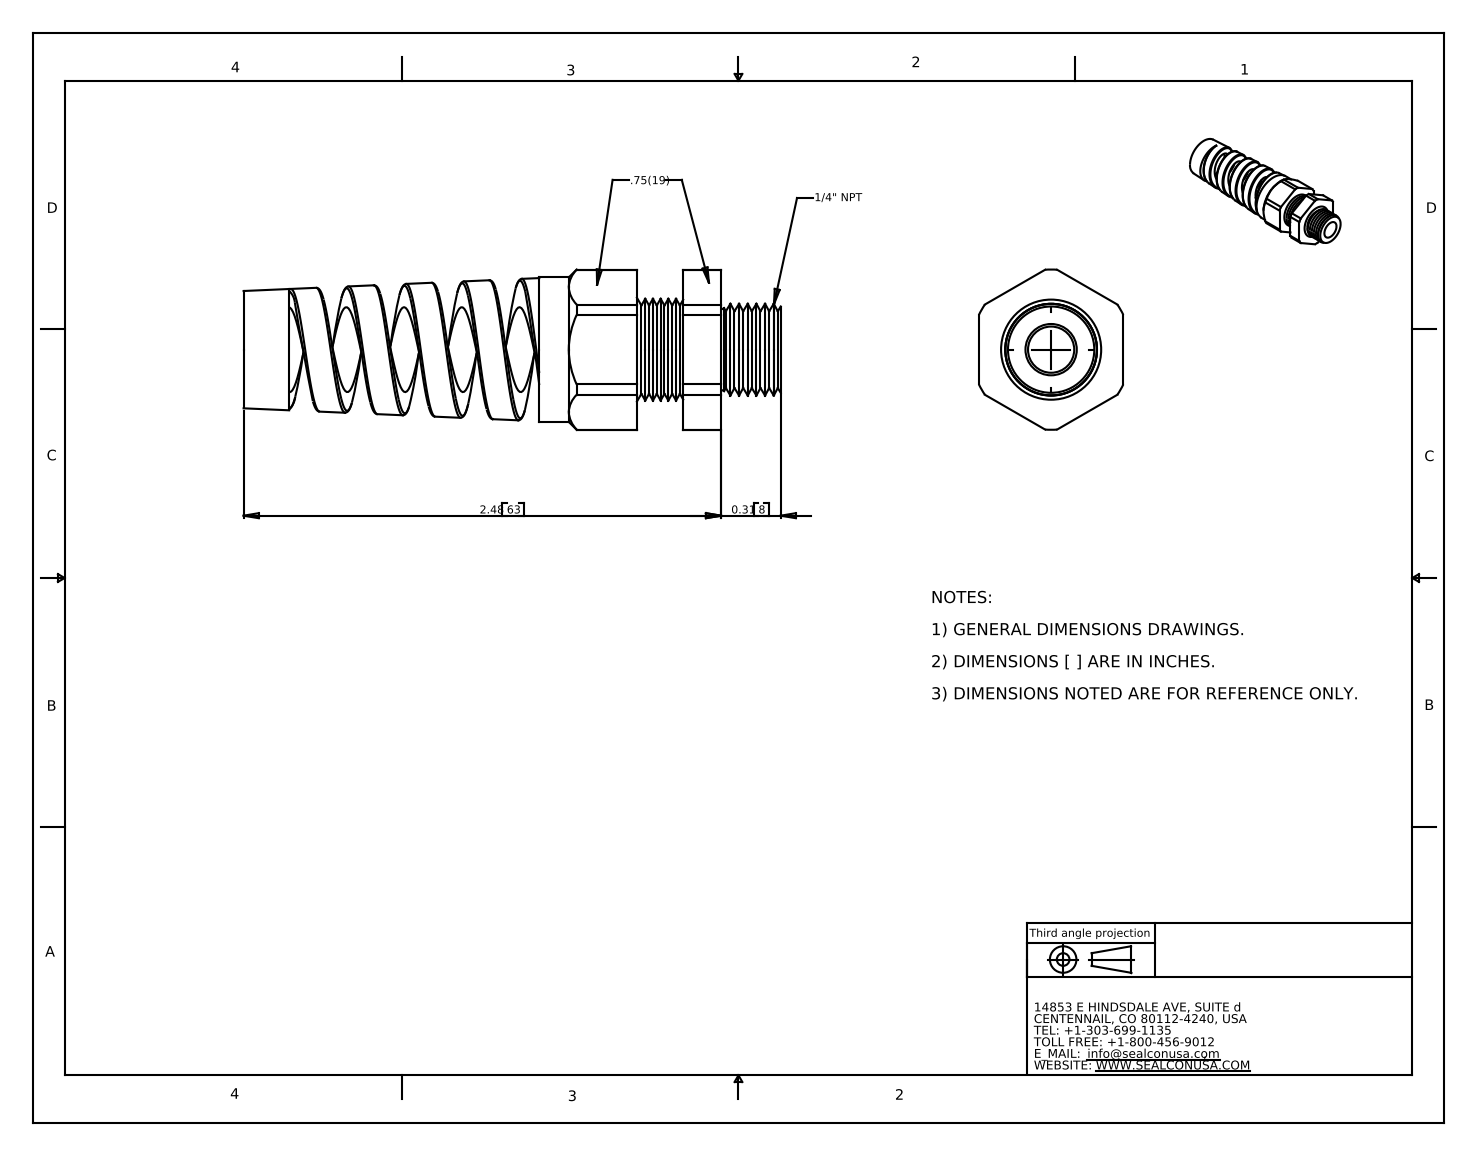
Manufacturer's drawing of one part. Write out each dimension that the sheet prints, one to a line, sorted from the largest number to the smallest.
2.48 63
0.31 8
